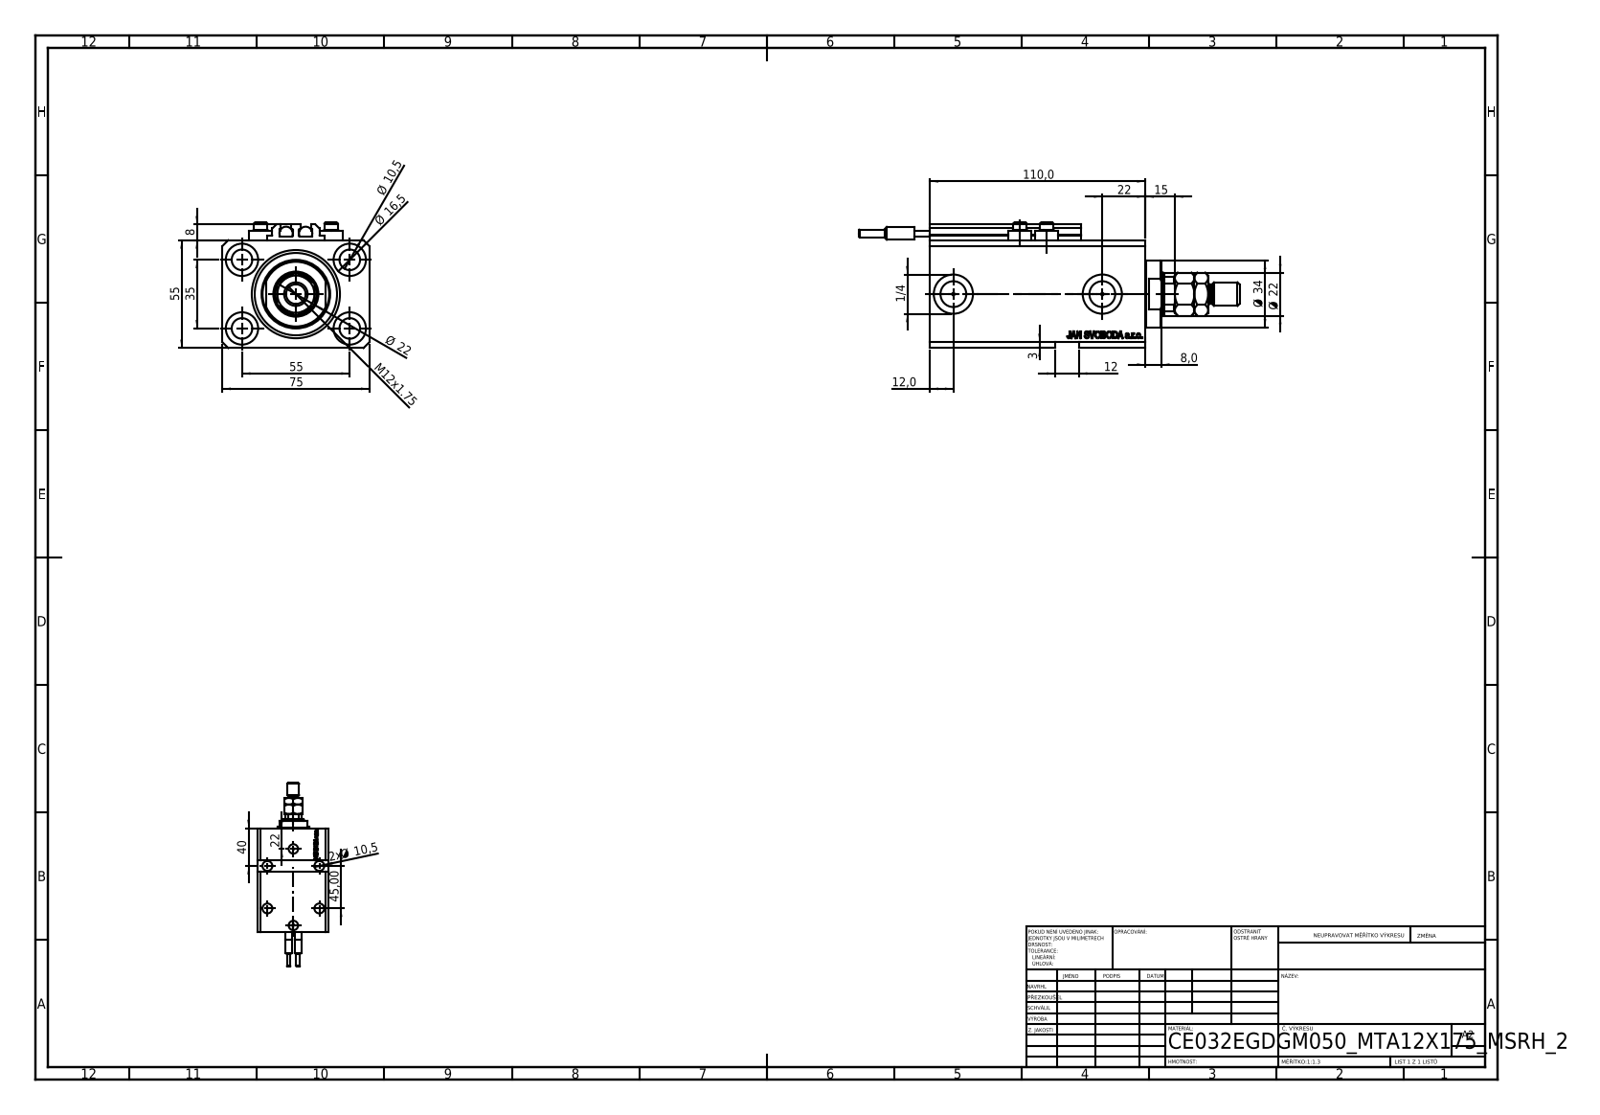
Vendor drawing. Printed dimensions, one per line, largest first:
110,0
75
55
55
45,00
40
35
Ø 34
Ø 22
22
Ø 22
22
Ø 16,5
15
M12x1.75
12,0
12
Ø 10,5
2x Ø 10,5
8
8,0
3
1/4
